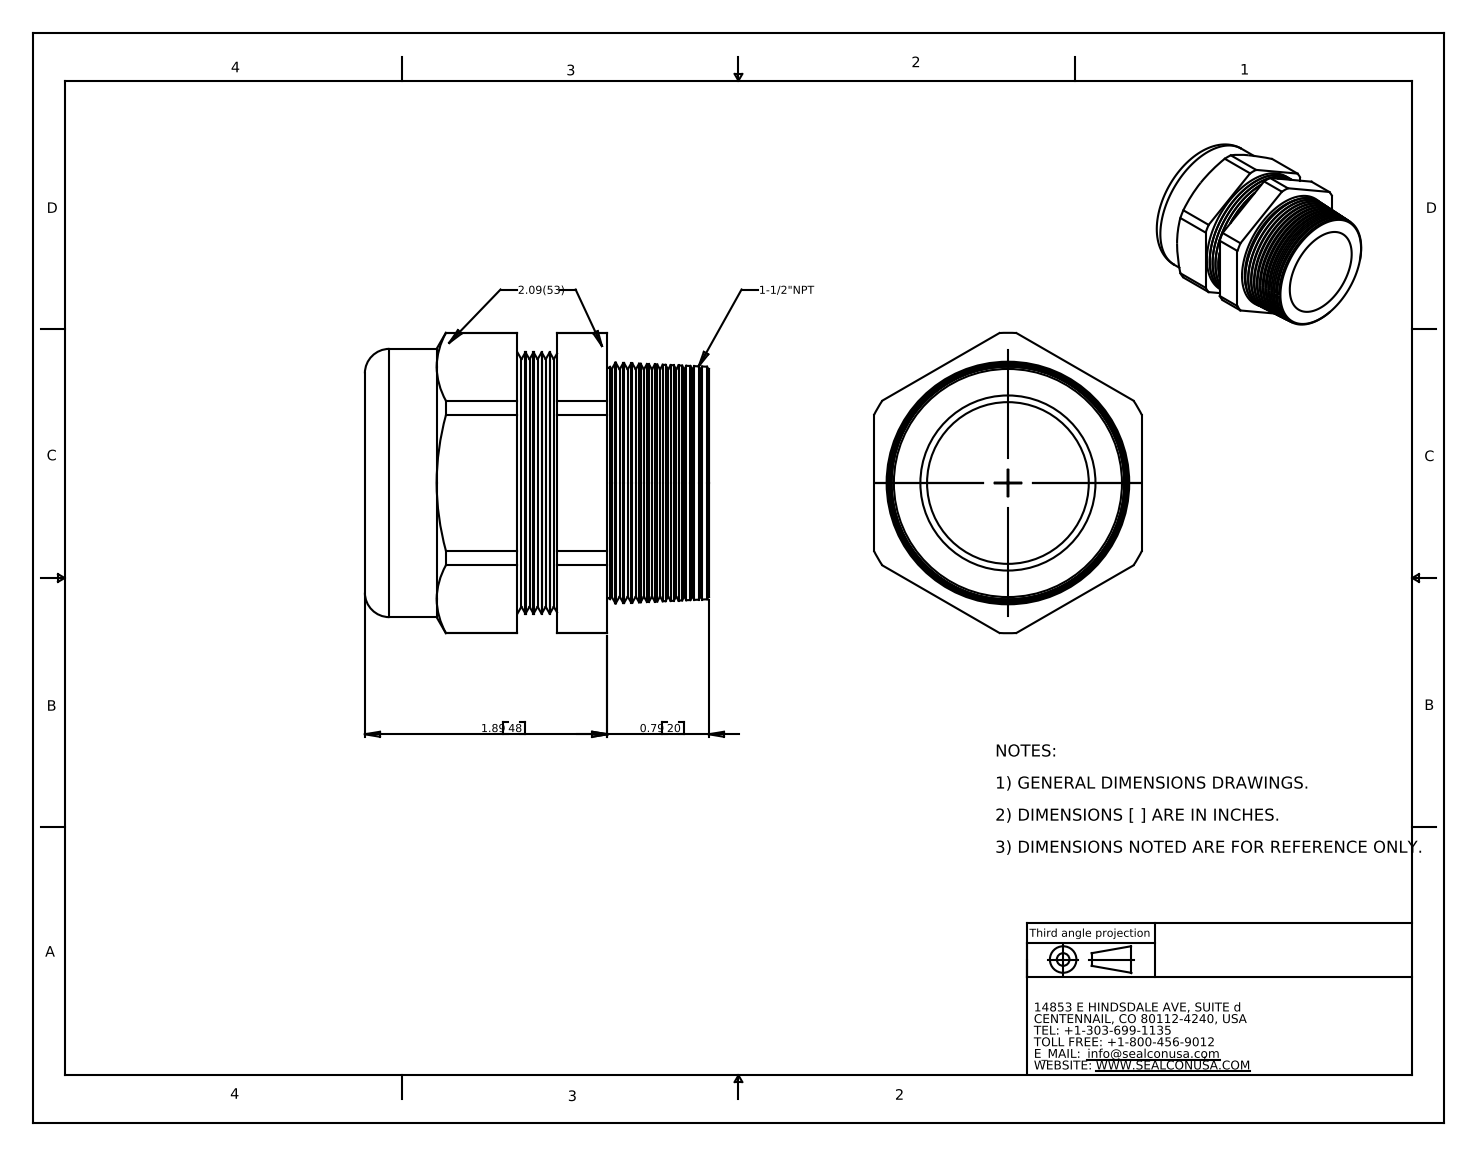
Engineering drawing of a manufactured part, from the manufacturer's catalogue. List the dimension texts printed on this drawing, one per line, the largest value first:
1.89 48
0.79 20
